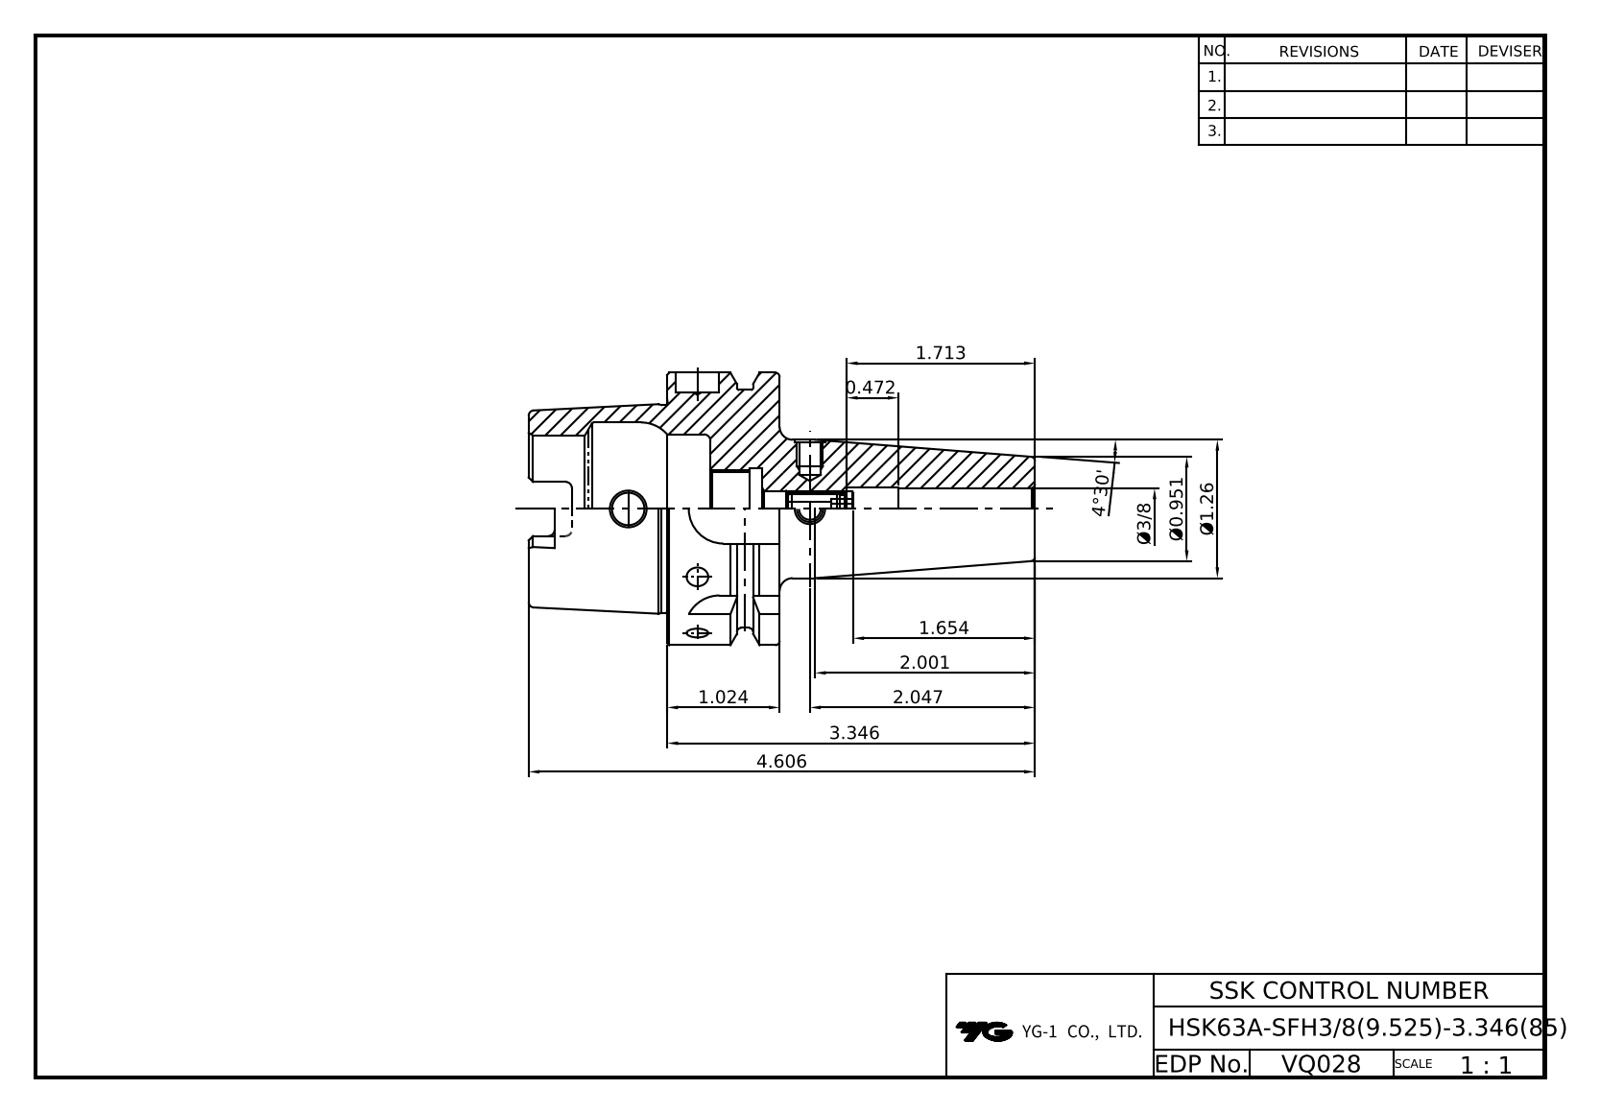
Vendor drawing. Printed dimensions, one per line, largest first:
4.606
4°30'
3.346
2.047
2.001
1.713
1.654
Ø1.26
1.024
Ø0.951
0.472
